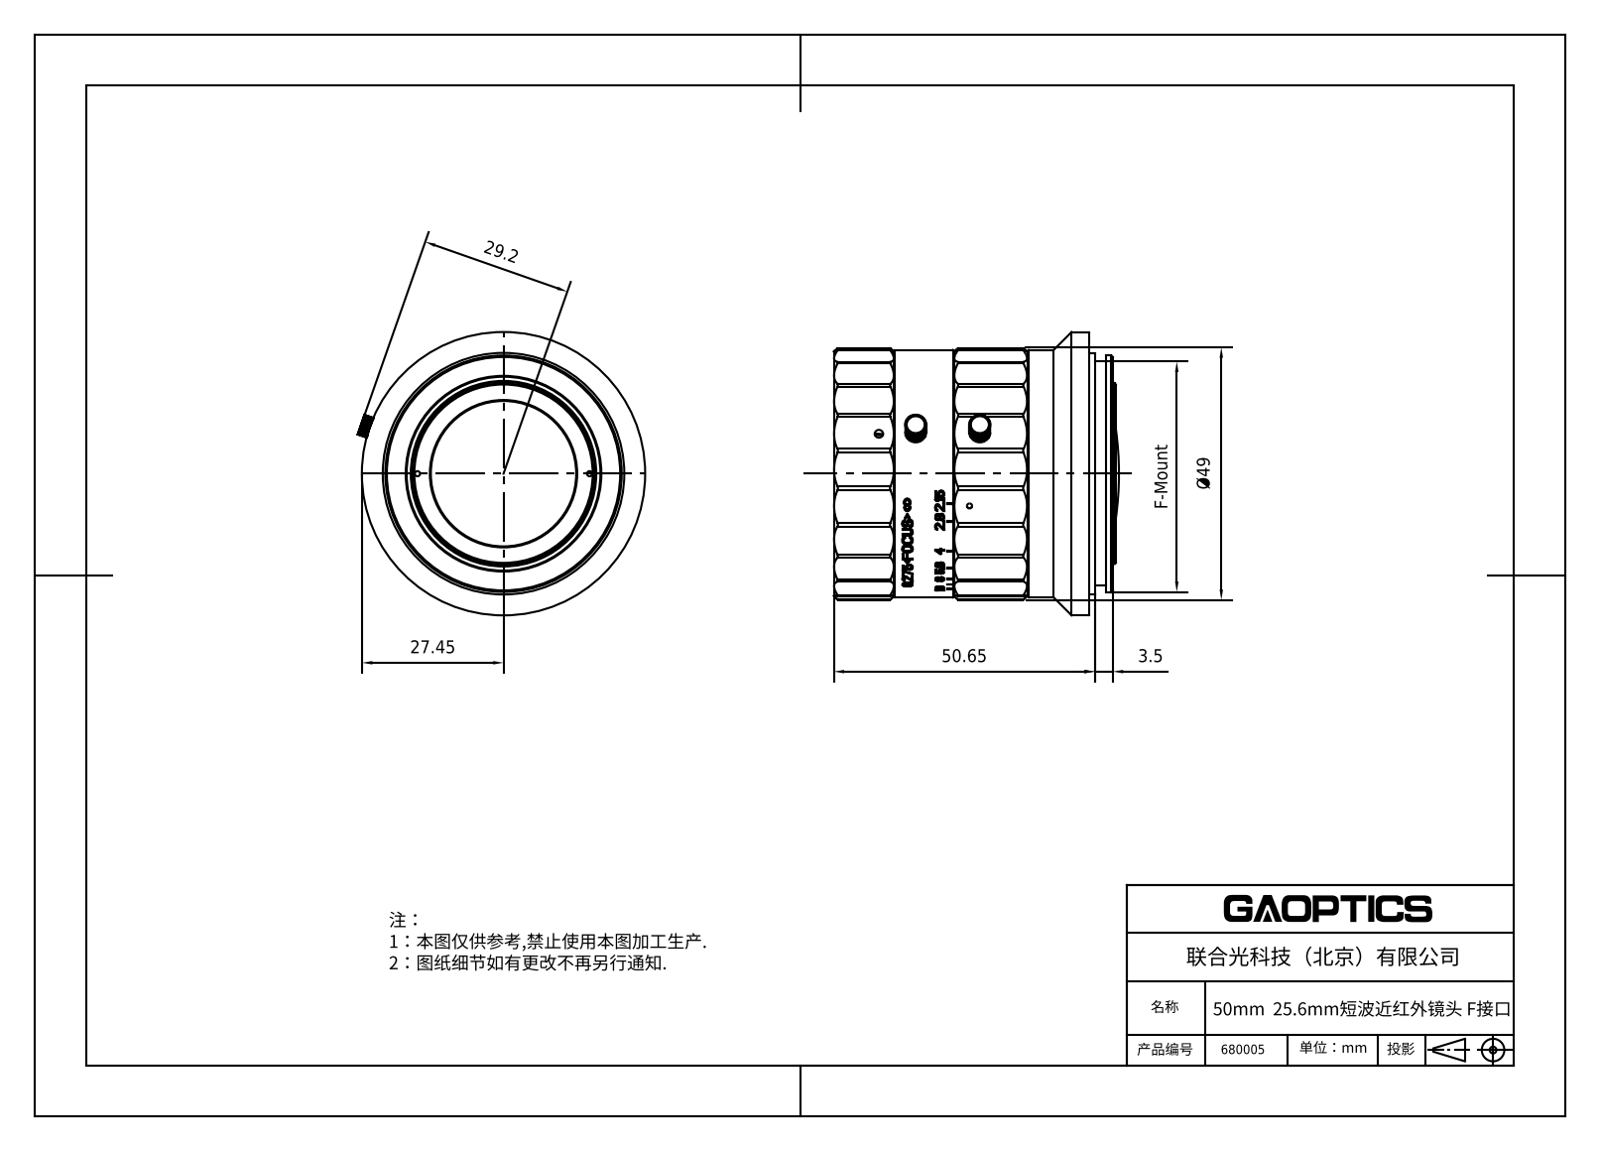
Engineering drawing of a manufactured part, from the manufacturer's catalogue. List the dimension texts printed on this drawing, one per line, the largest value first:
50.65
Ø49
29.2
27.45
3.5
F-Mount
